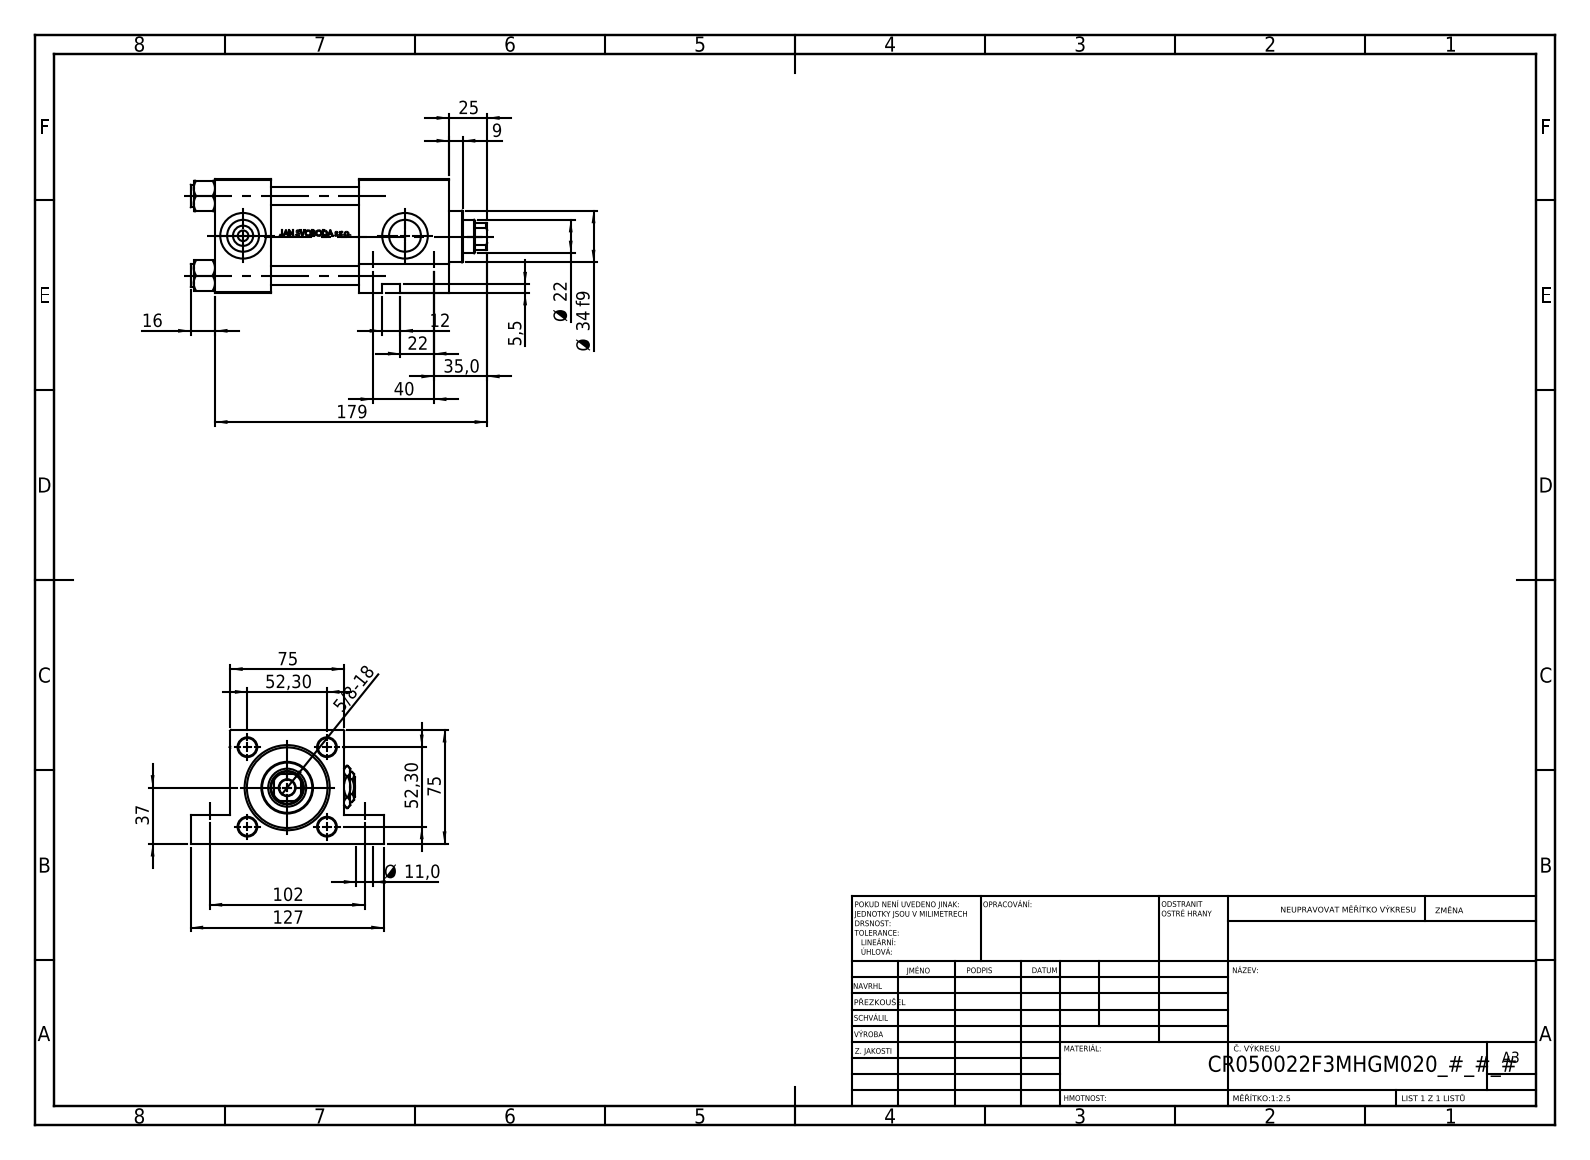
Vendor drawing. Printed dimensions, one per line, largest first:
179
127
102
75
75
52,30
52,30
40
37
35,0
Ø 34 f9
25
Ø 22
22
16
12
Ø 11,0
9
5,5
5/8-18
